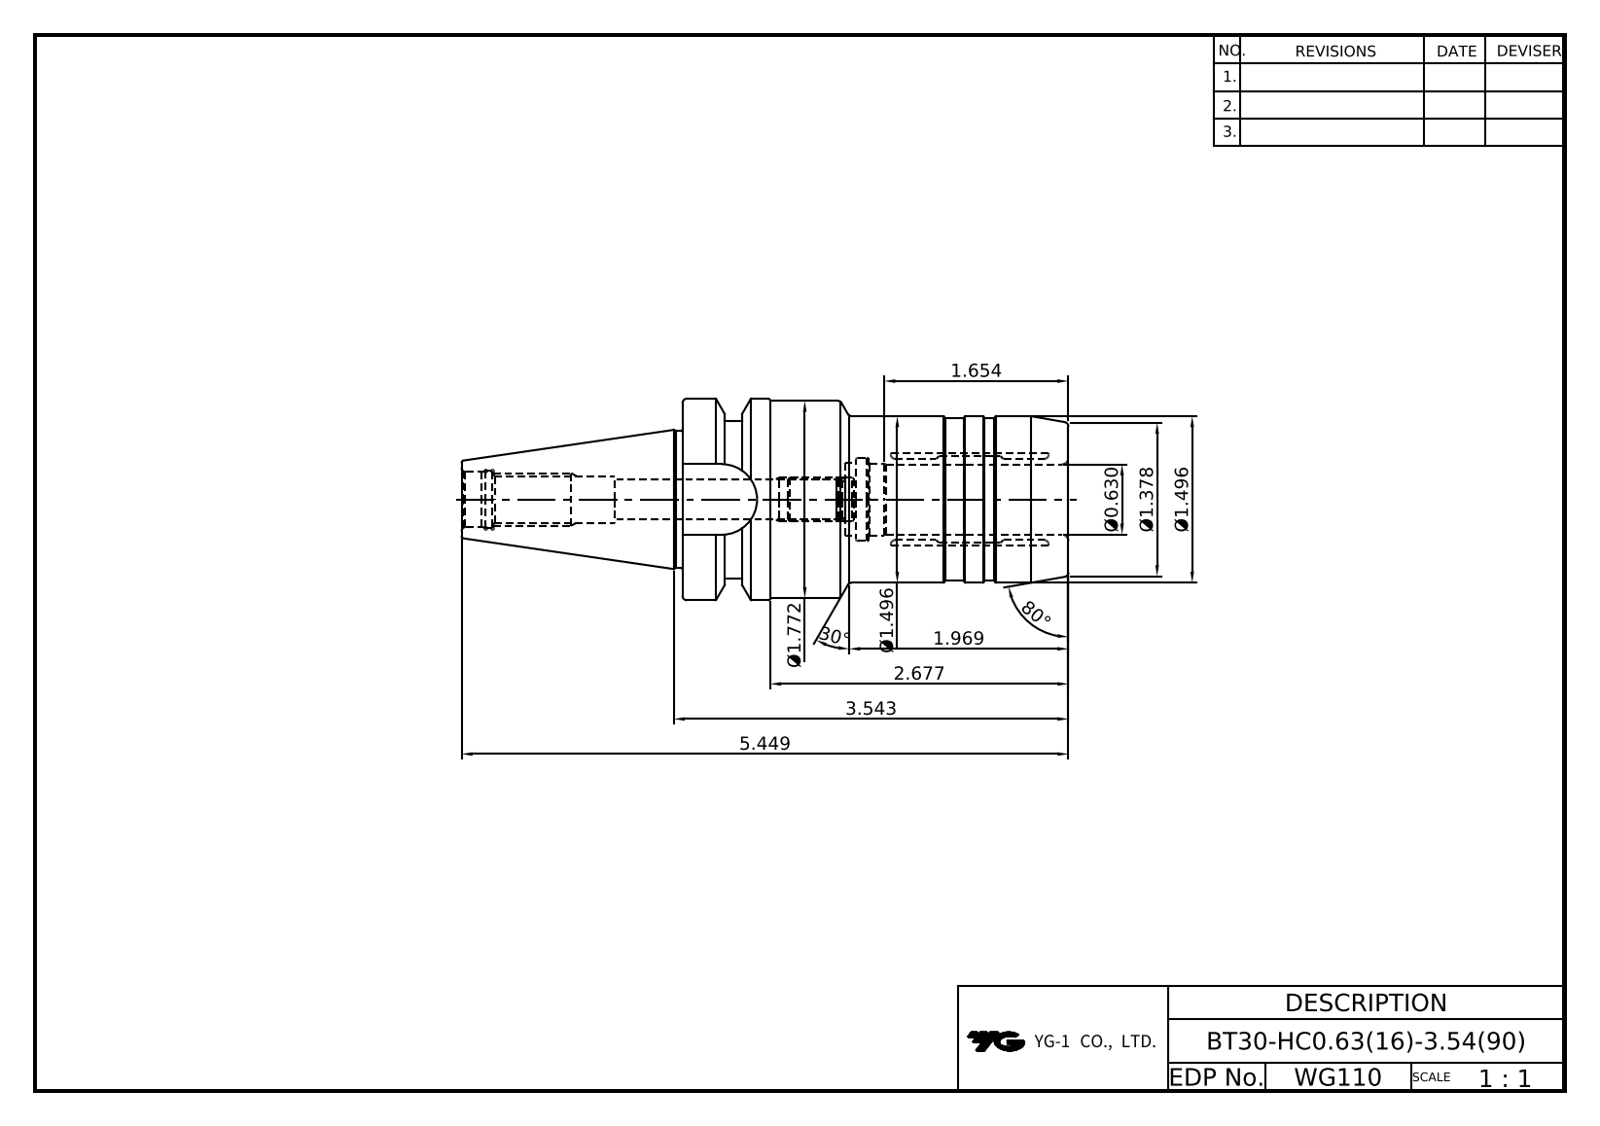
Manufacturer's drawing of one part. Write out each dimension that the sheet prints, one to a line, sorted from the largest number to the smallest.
80°
30°
5.449
3.543
2.677
1.969
Ø1.772
1.654
Ø1.496
Ø1.496
Ø1.378
Ø0.630
